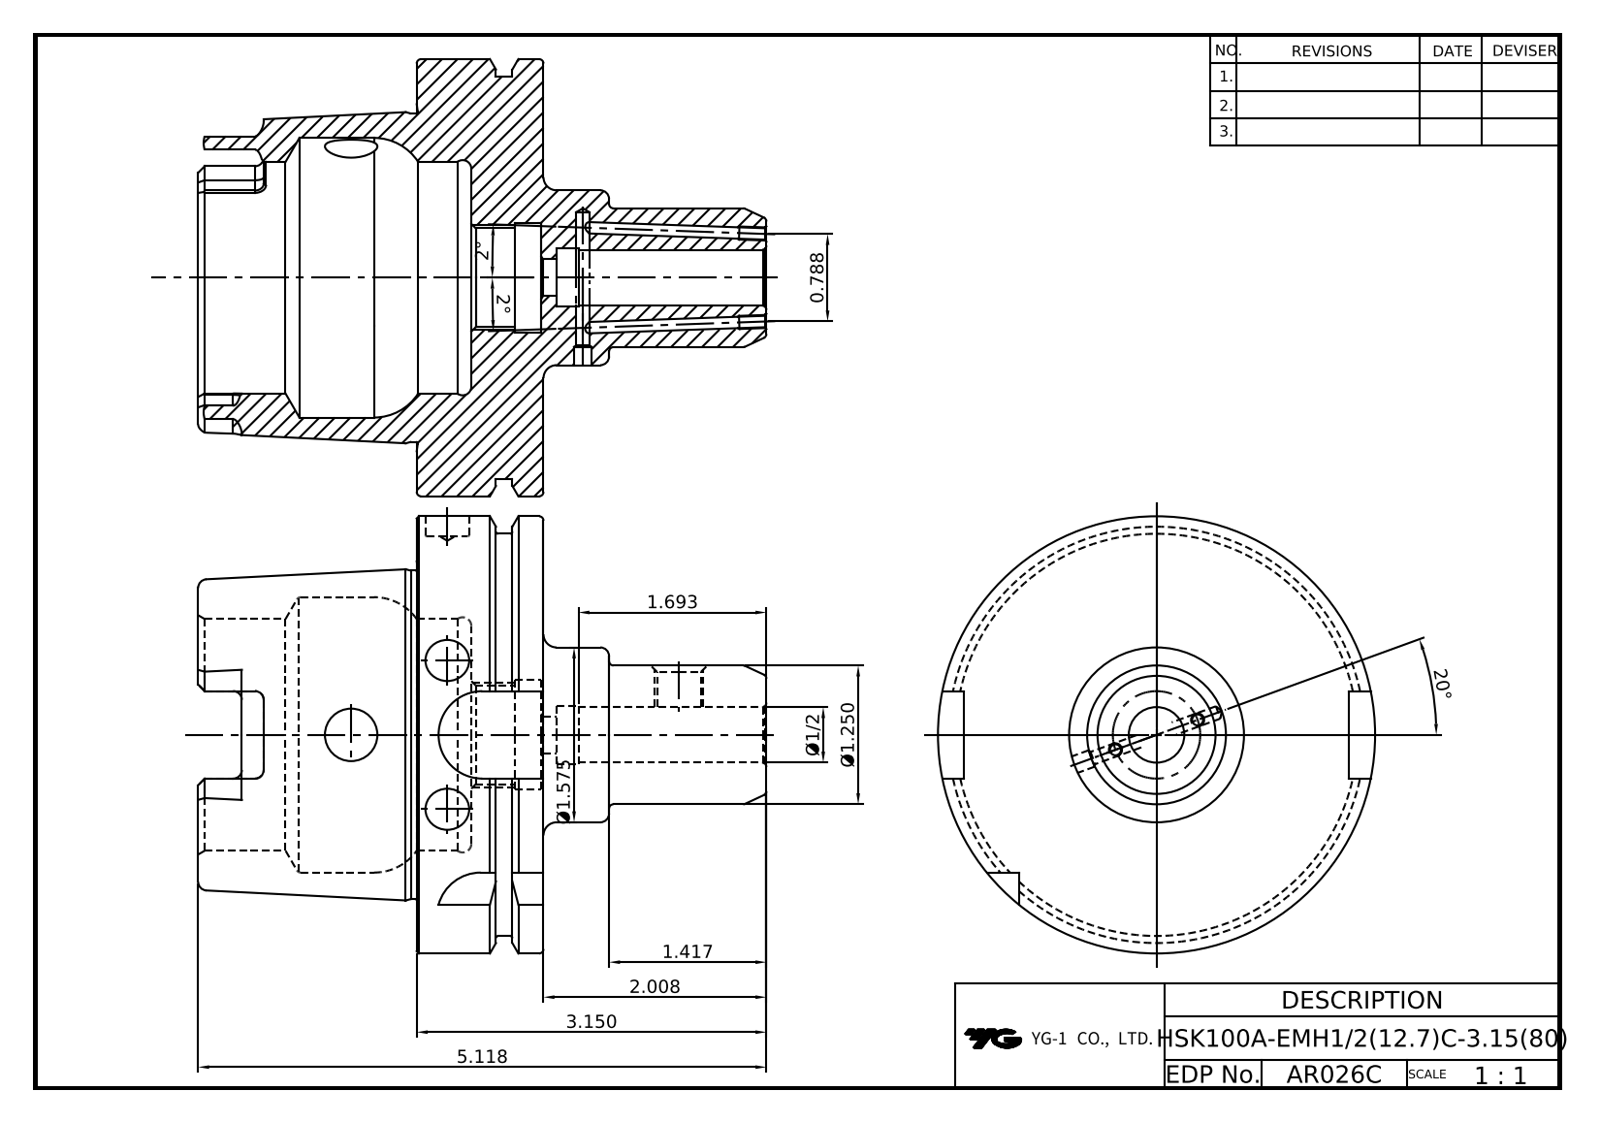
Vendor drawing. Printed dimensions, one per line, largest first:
20°
5.118
3.150
2.008
2°
2°
1.693
Ø1.575
1.417
Ø1.250
0.788
Ø1/2
